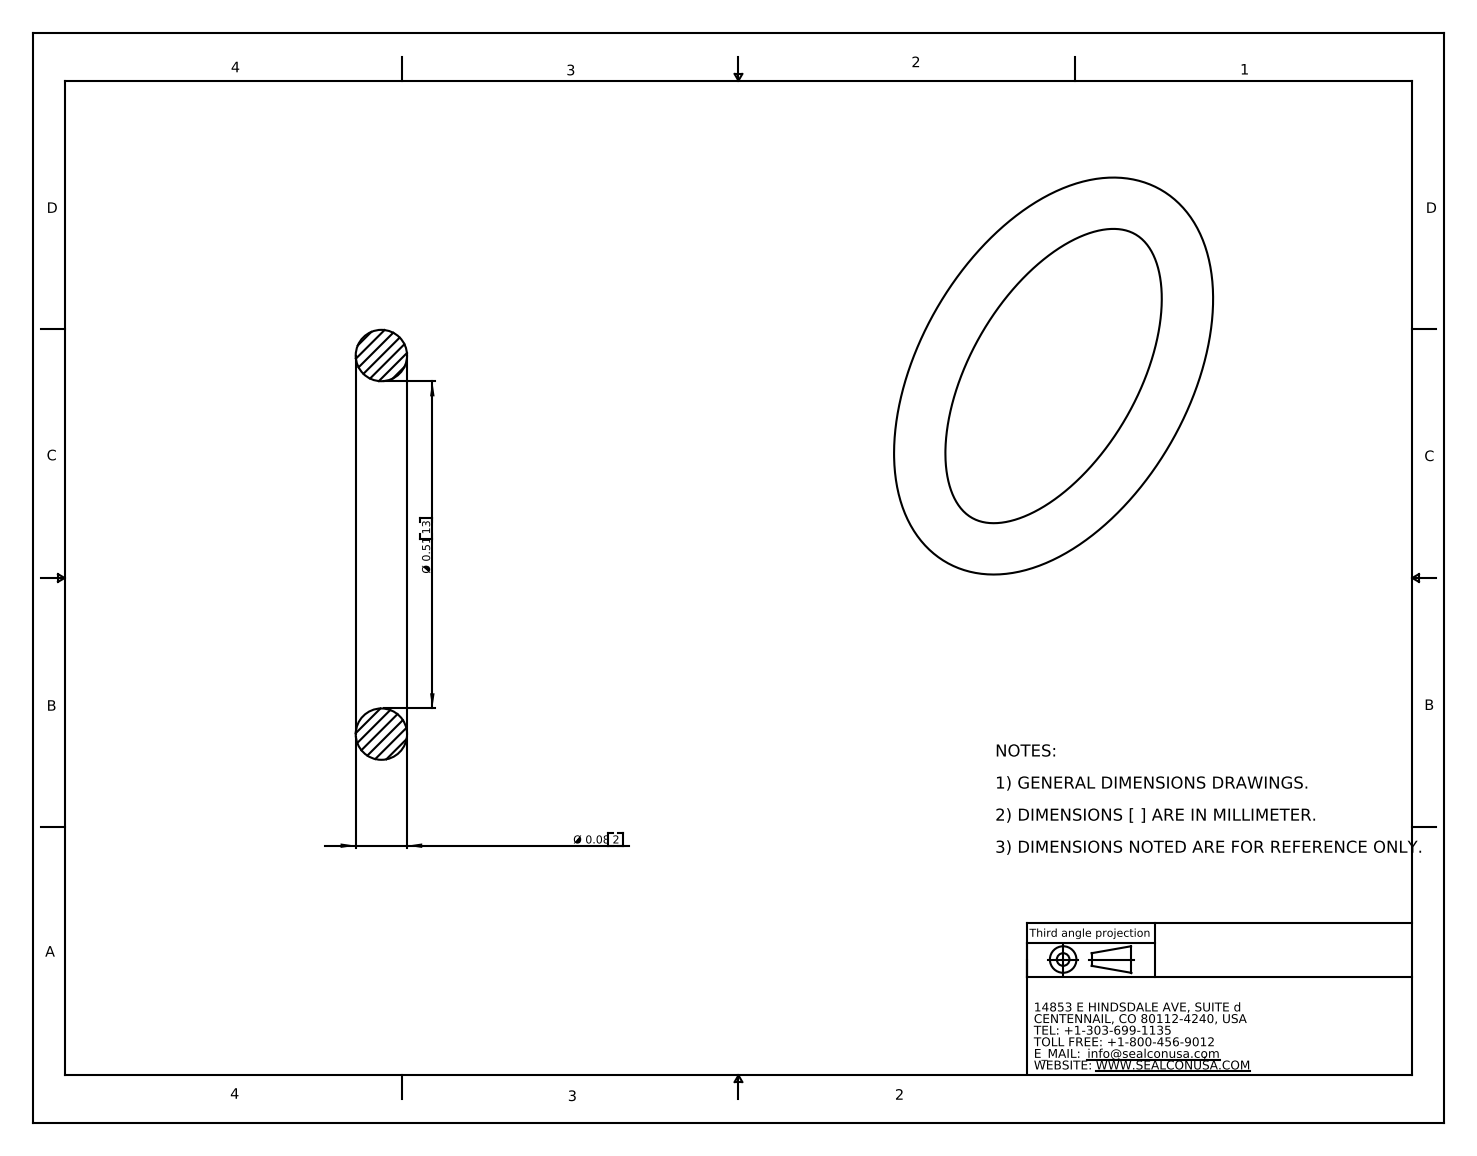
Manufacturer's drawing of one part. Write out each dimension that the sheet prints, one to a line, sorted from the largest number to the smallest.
Ø 0.51 13
Ø 0.08 2
